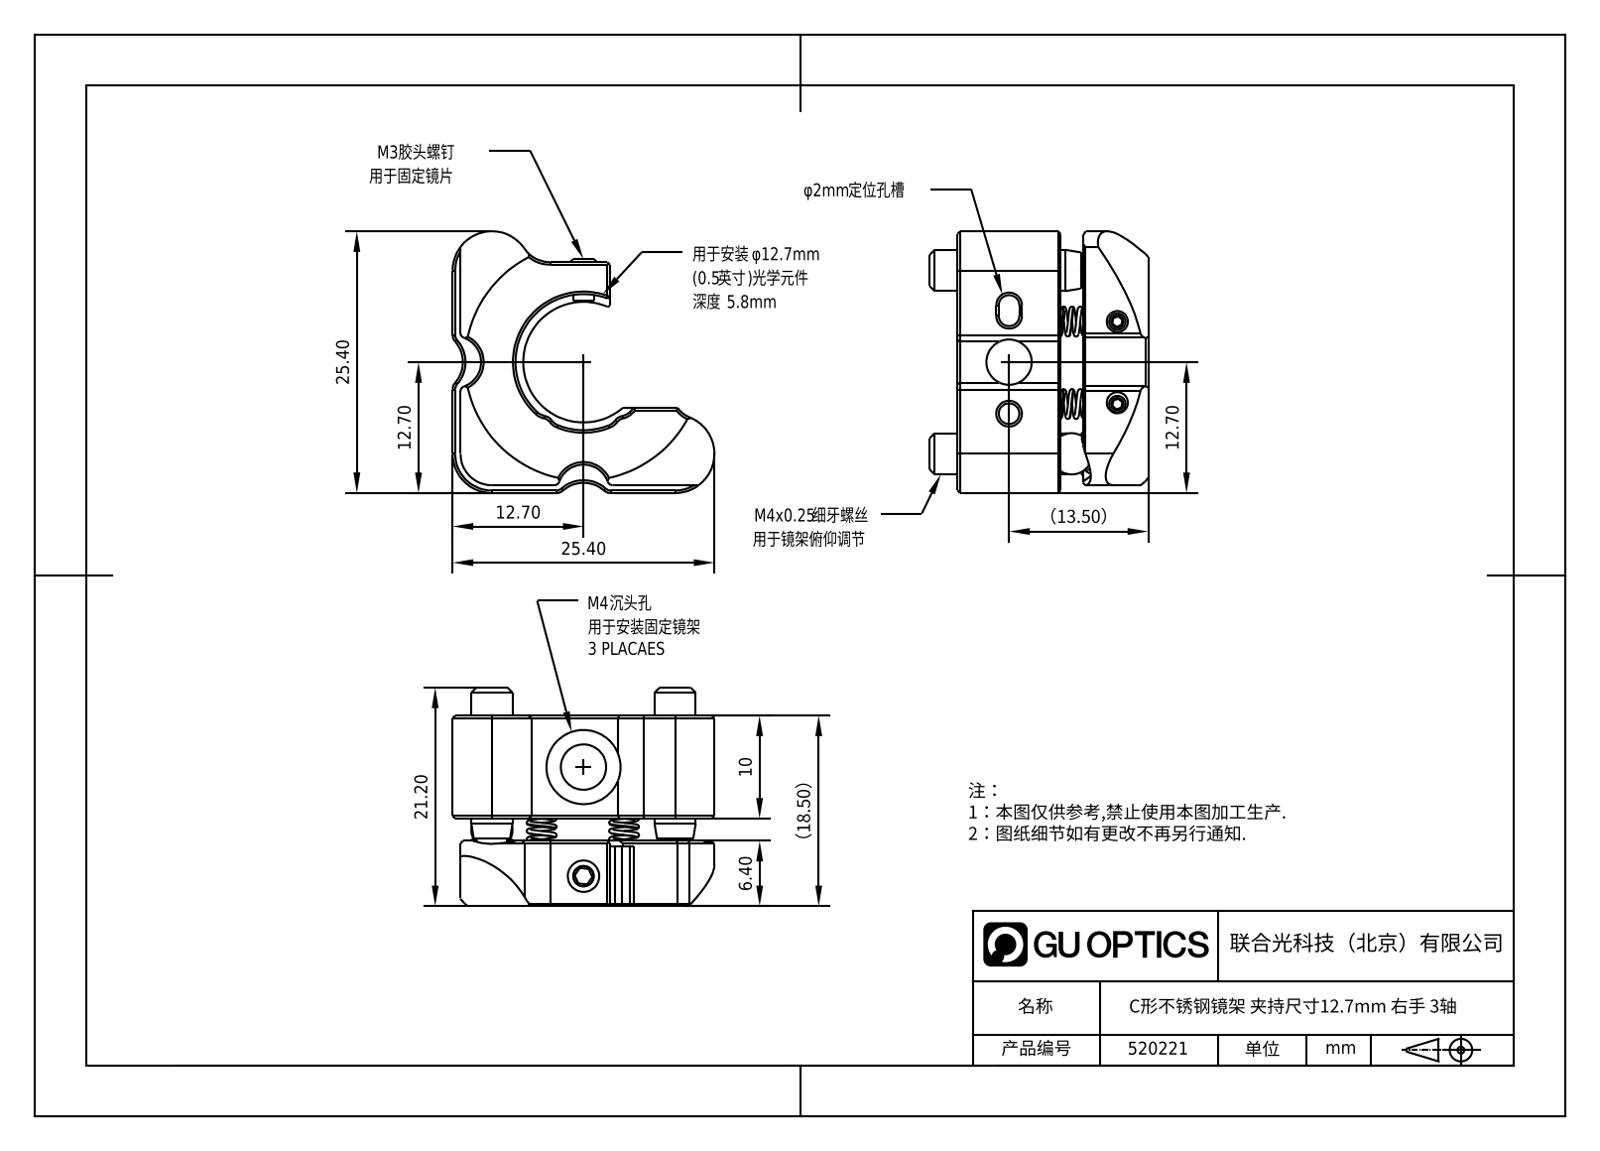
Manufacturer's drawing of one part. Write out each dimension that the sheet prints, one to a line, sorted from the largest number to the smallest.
25.40
25.40
21.20
（18.50）
（13.50）
12.70
12.70
12.70
10
6.40
